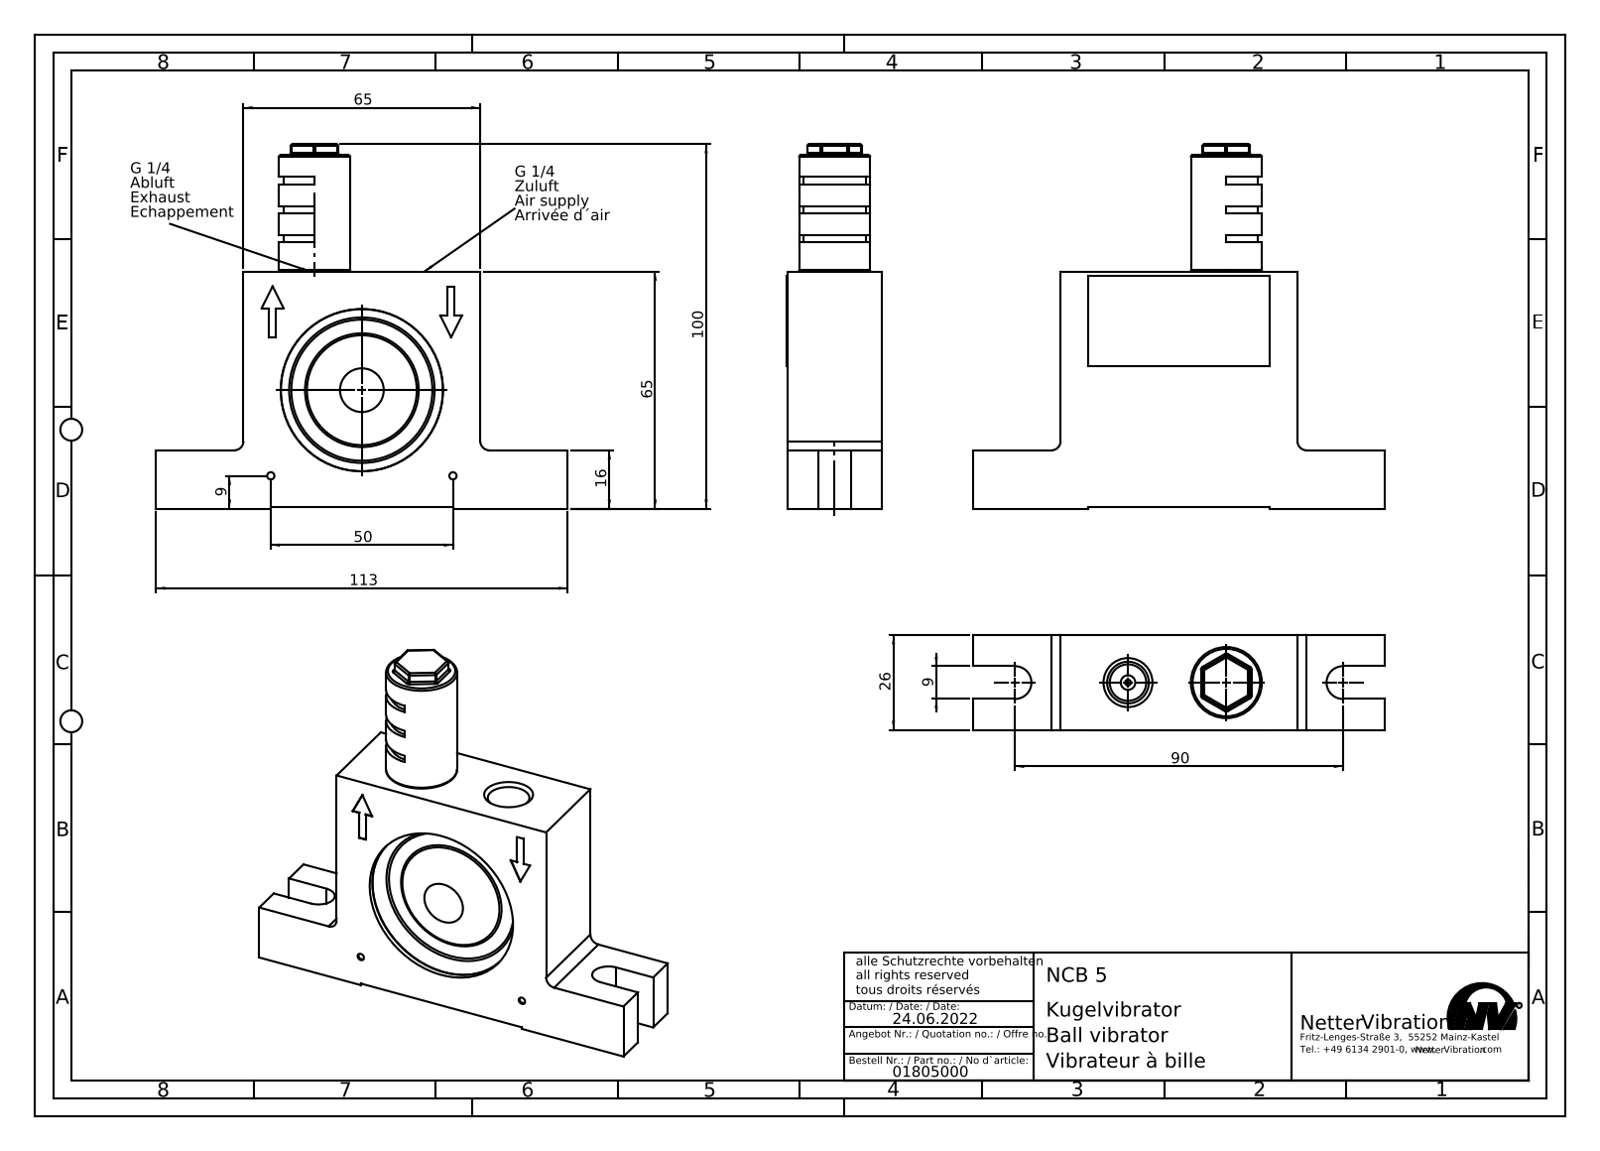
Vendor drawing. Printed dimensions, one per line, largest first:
113
100
90
65
65
50
26
16
9
9
